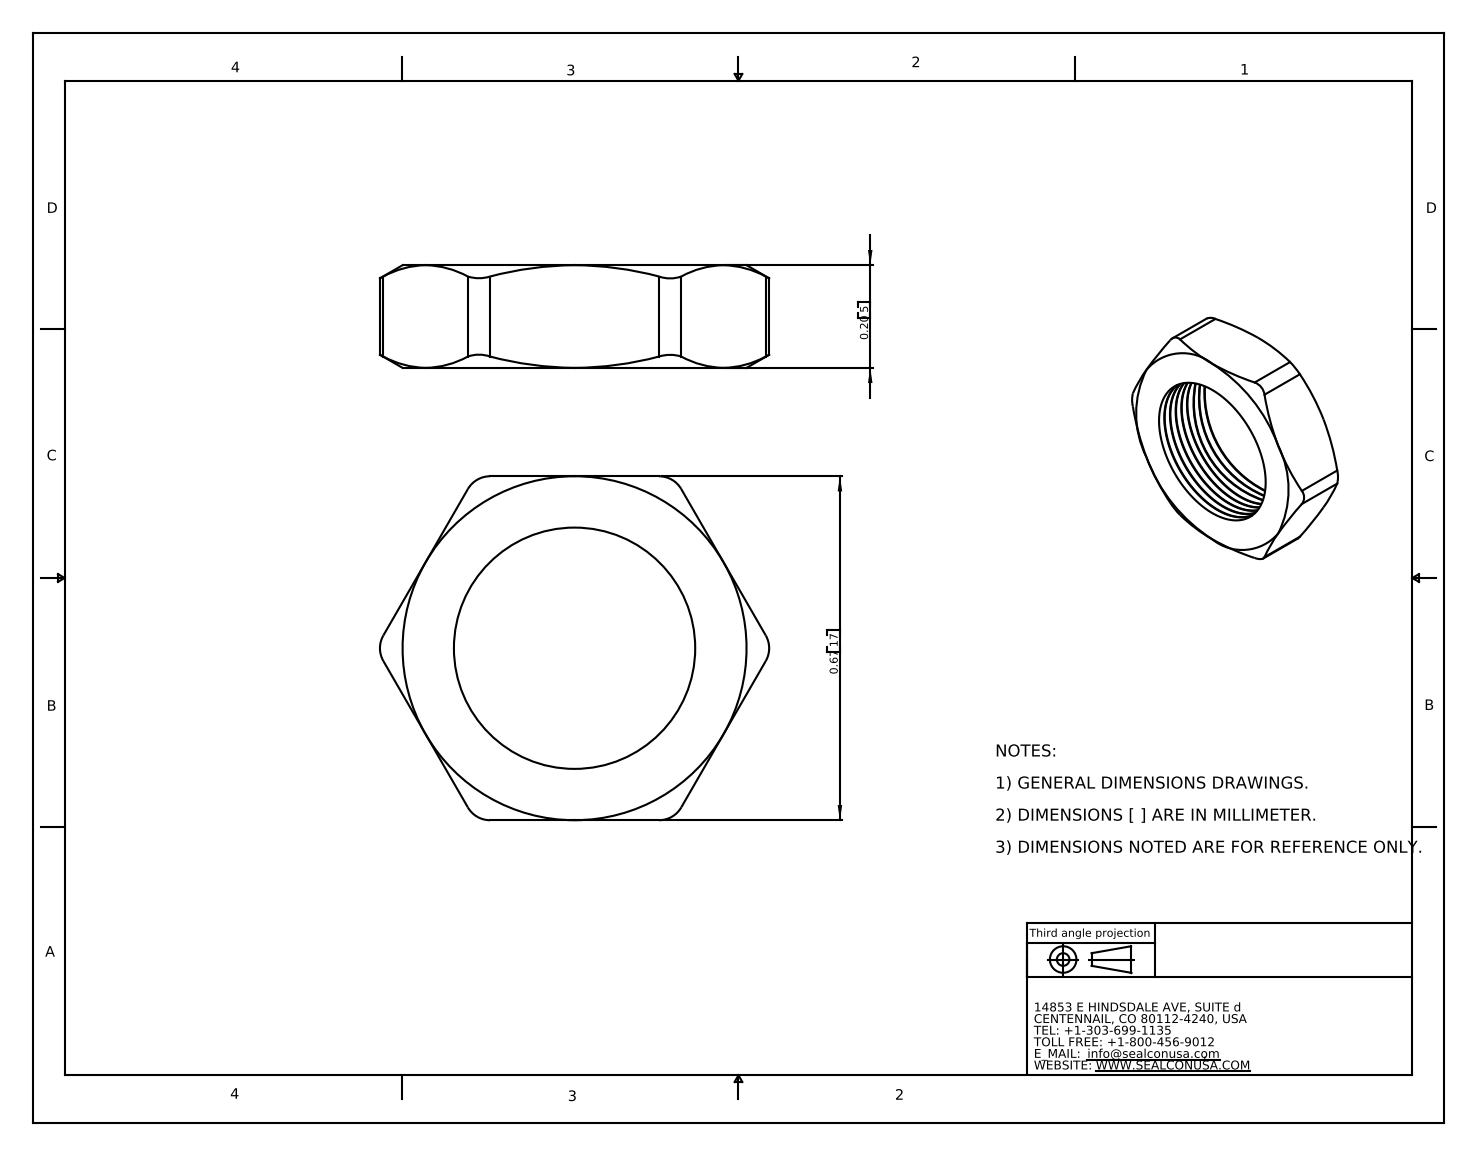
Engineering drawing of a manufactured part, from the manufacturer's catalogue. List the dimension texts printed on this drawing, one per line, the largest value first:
0.67 17
0.20 5
